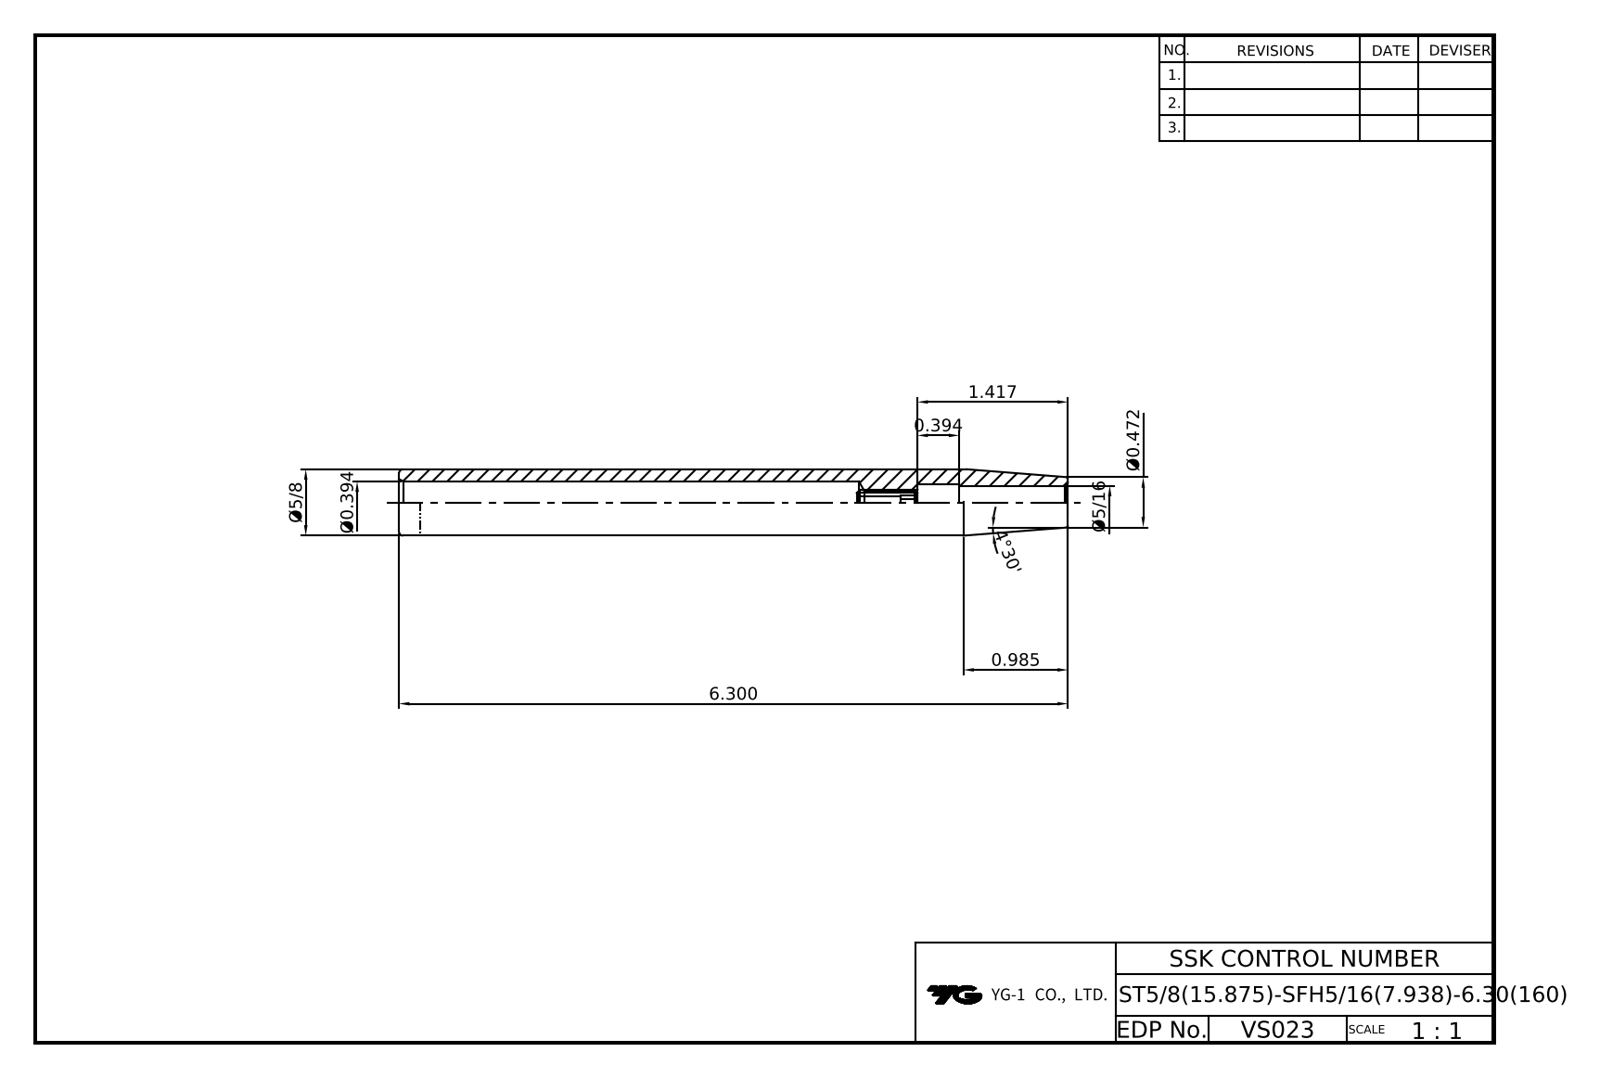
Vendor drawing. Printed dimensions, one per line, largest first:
6.300
4°30'
1.417
0.985
Ø5/8
Ø0.472
0.394
